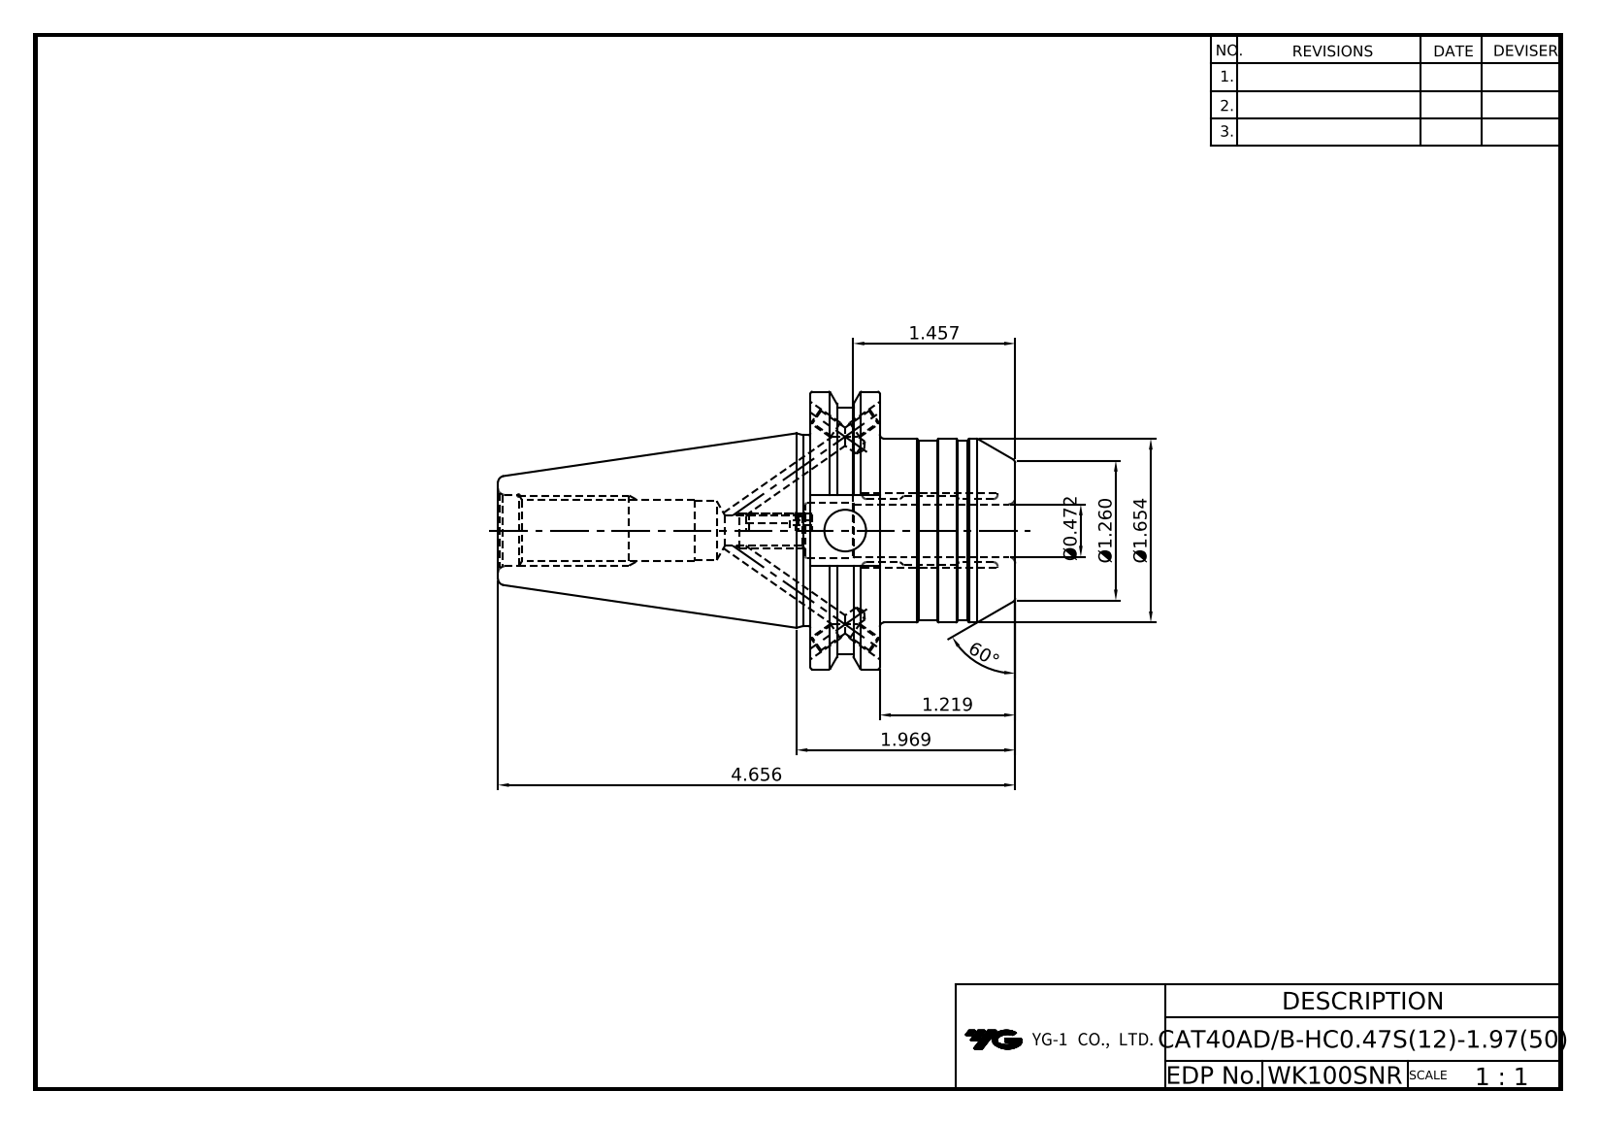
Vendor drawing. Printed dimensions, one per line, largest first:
60°
4.656
1.969
Ø1.654
1.457
Ø1.260
1.219
Ø0.472
